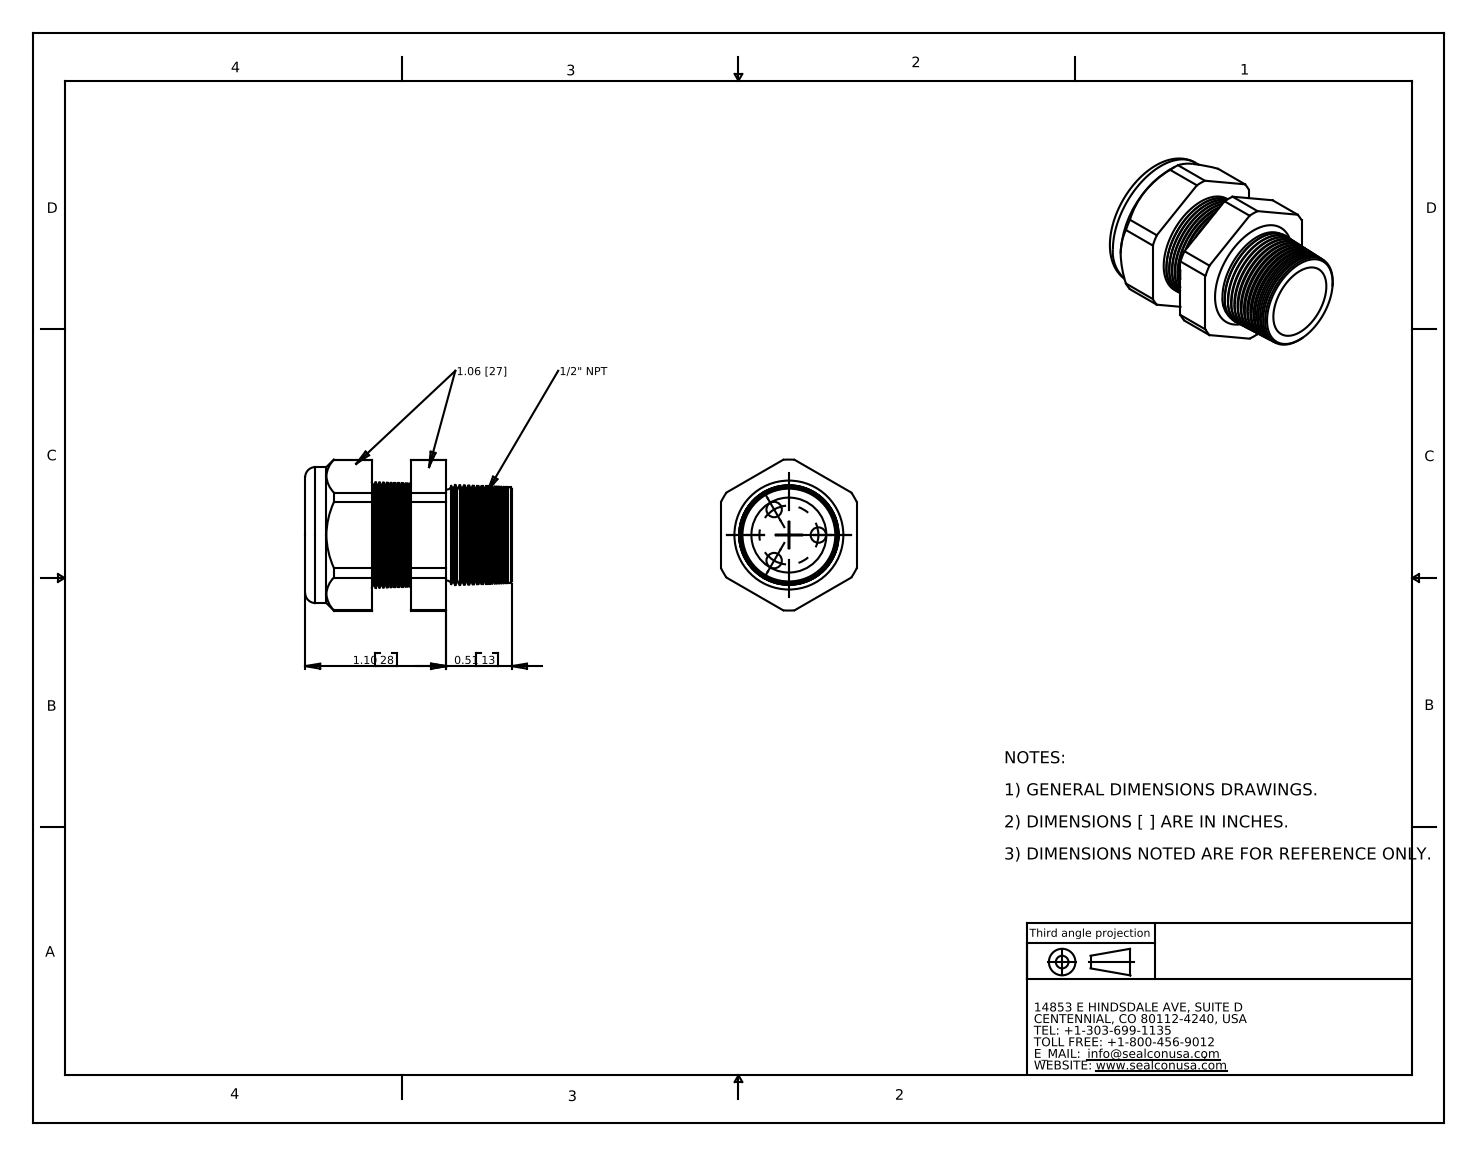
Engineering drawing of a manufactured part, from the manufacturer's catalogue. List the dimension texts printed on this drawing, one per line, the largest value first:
1.10 28
0.51 13
